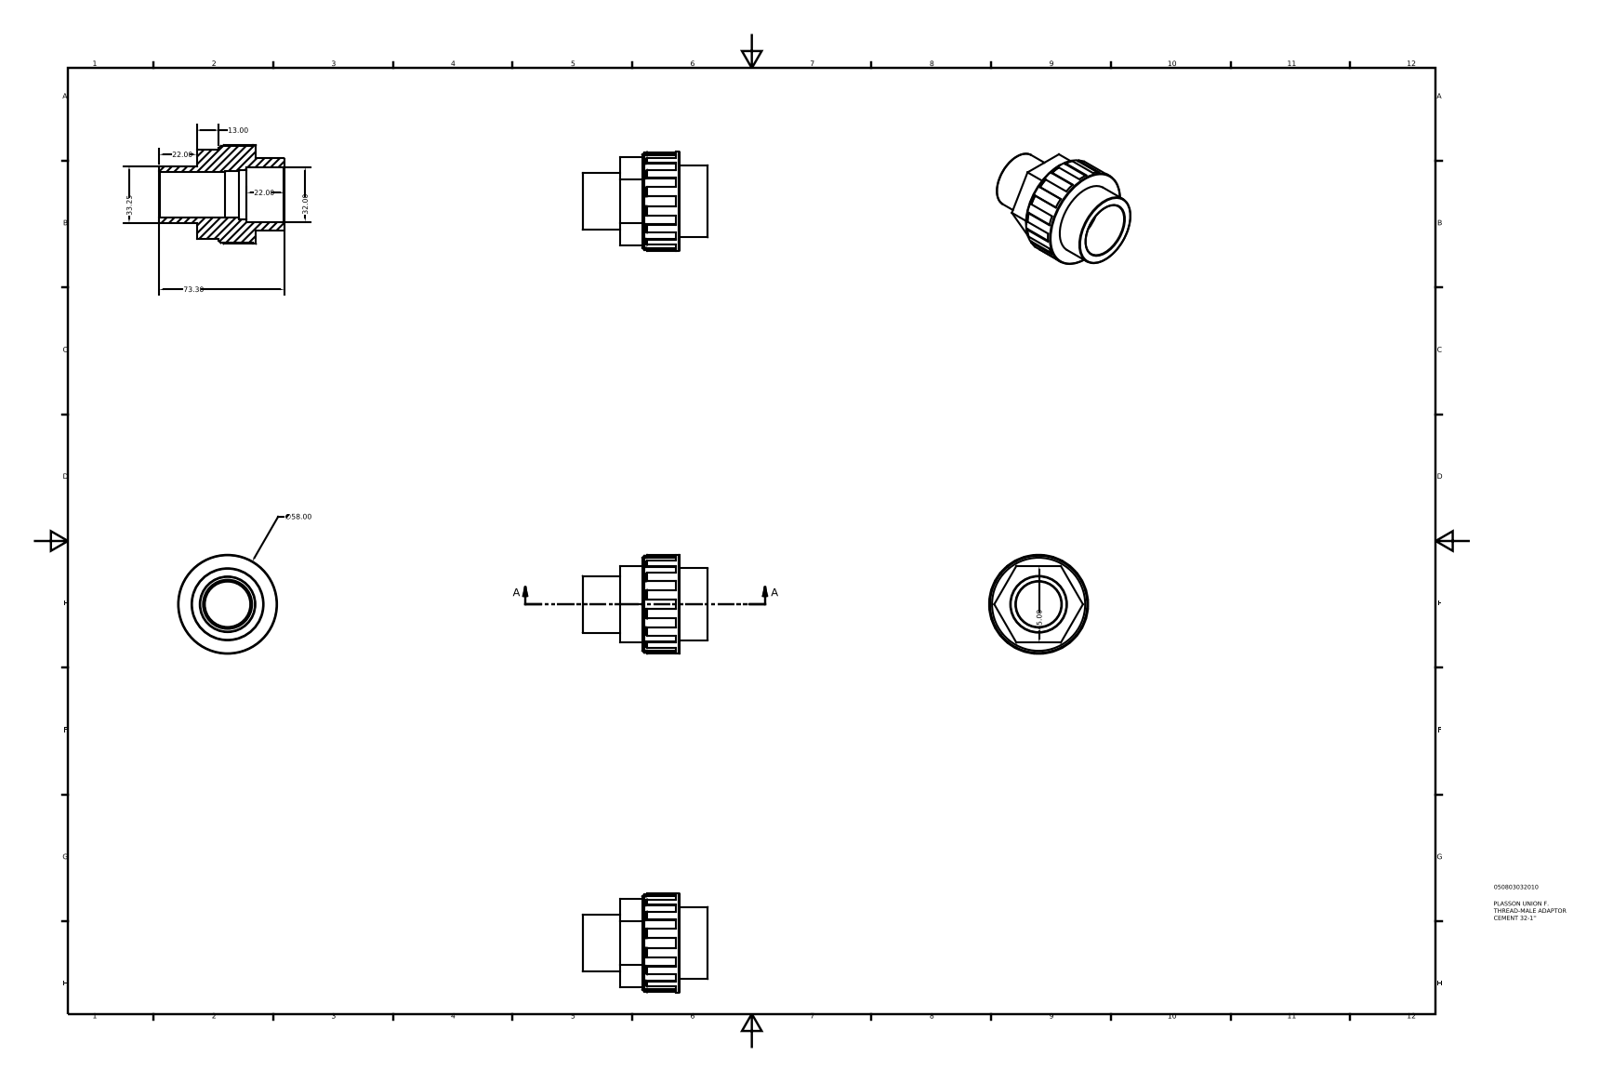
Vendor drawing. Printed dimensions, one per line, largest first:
73.30
∅58.00
45.00
33.25
32.00
22.00
22.00
13.00
